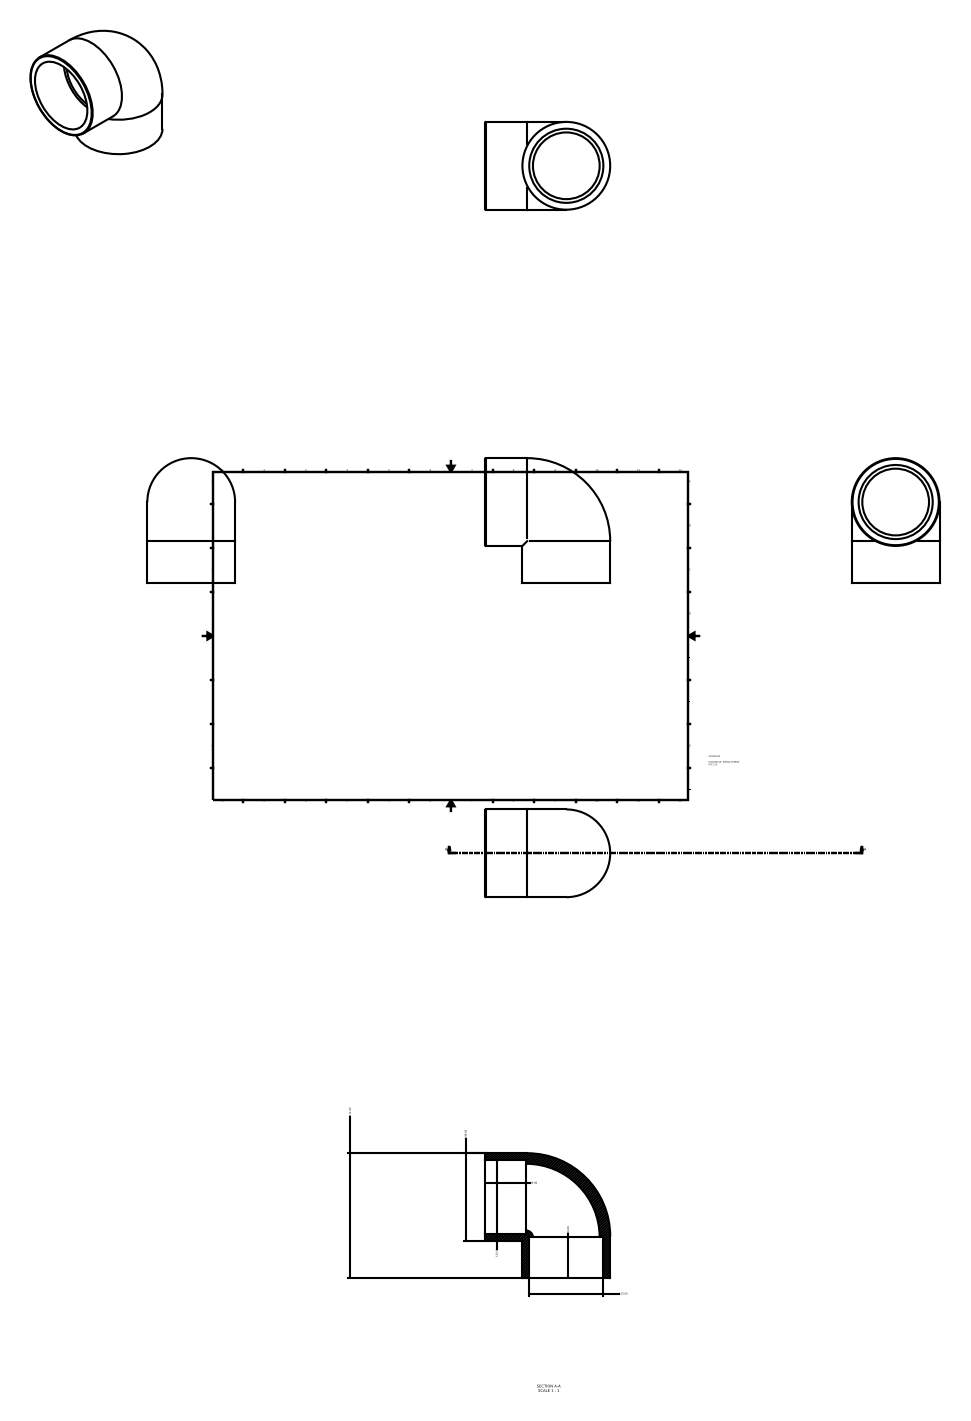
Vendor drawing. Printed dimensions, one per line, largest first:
211.00
148.00
125.00
125.00
69.00
69.00
